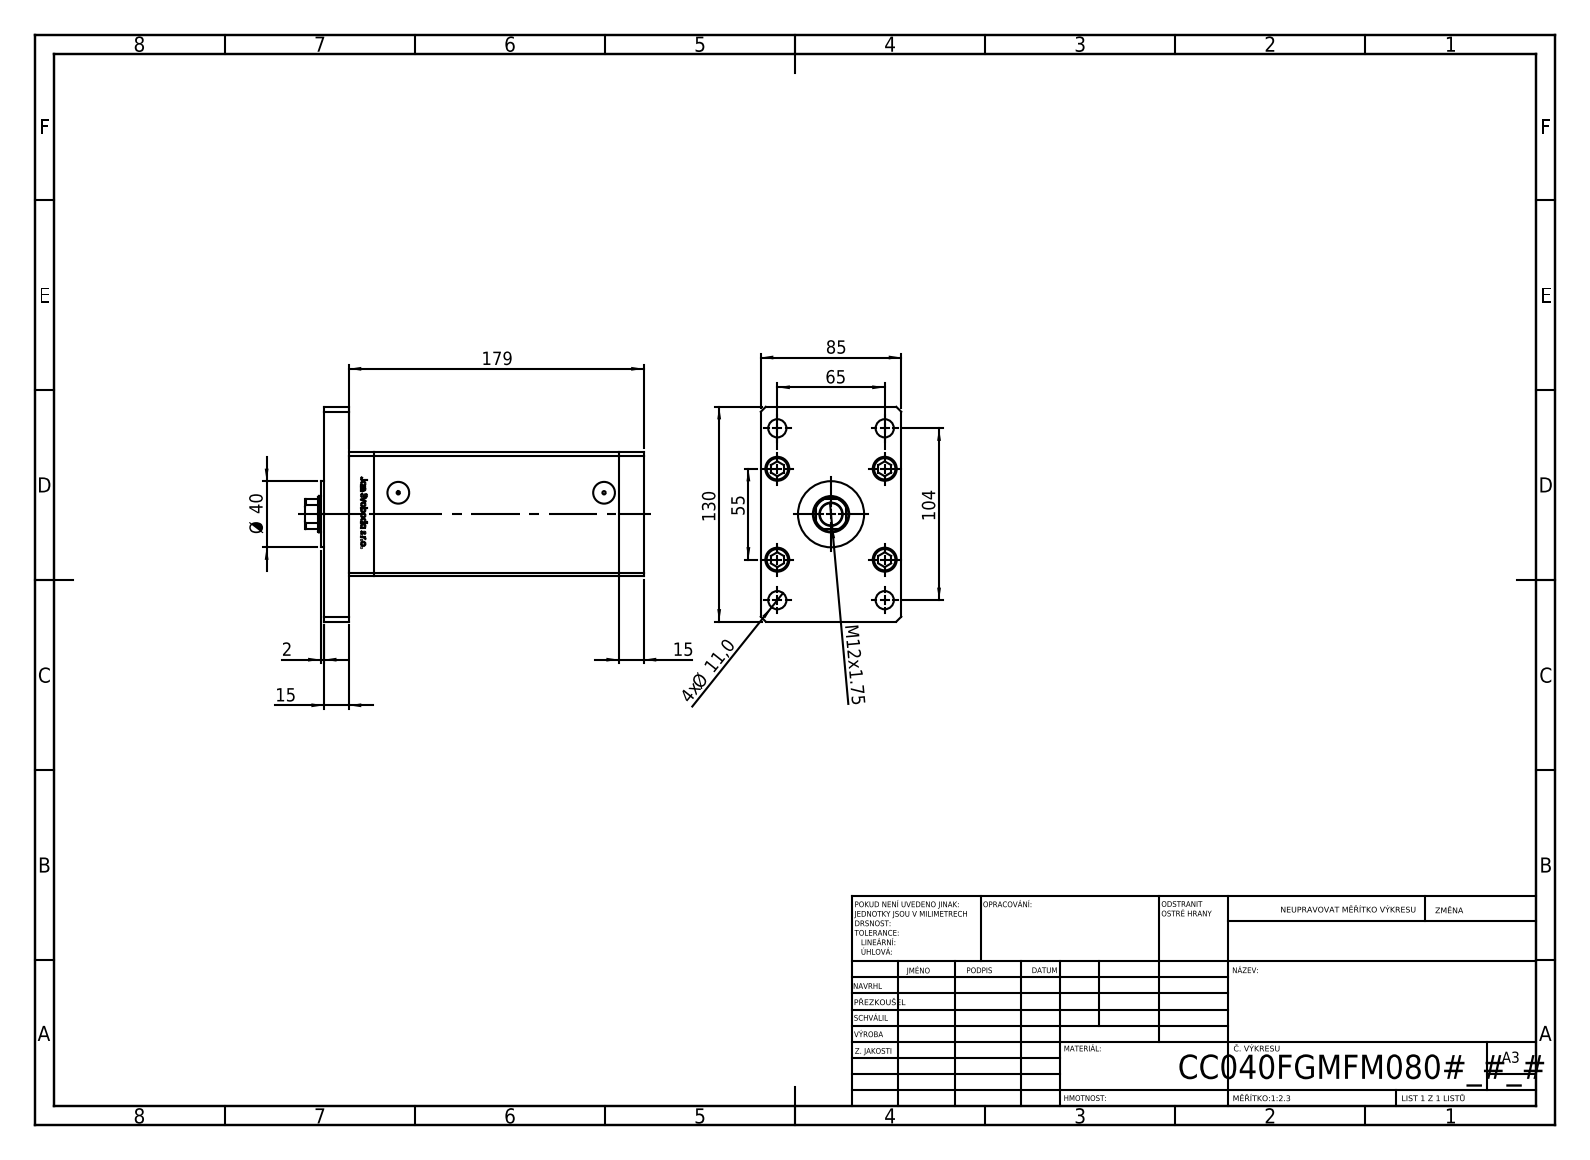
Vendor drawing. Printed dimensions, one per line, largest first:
179
130
104
85
65
55
Ø 40
15
15
M12x1.75
4x Ø 11,0
2
